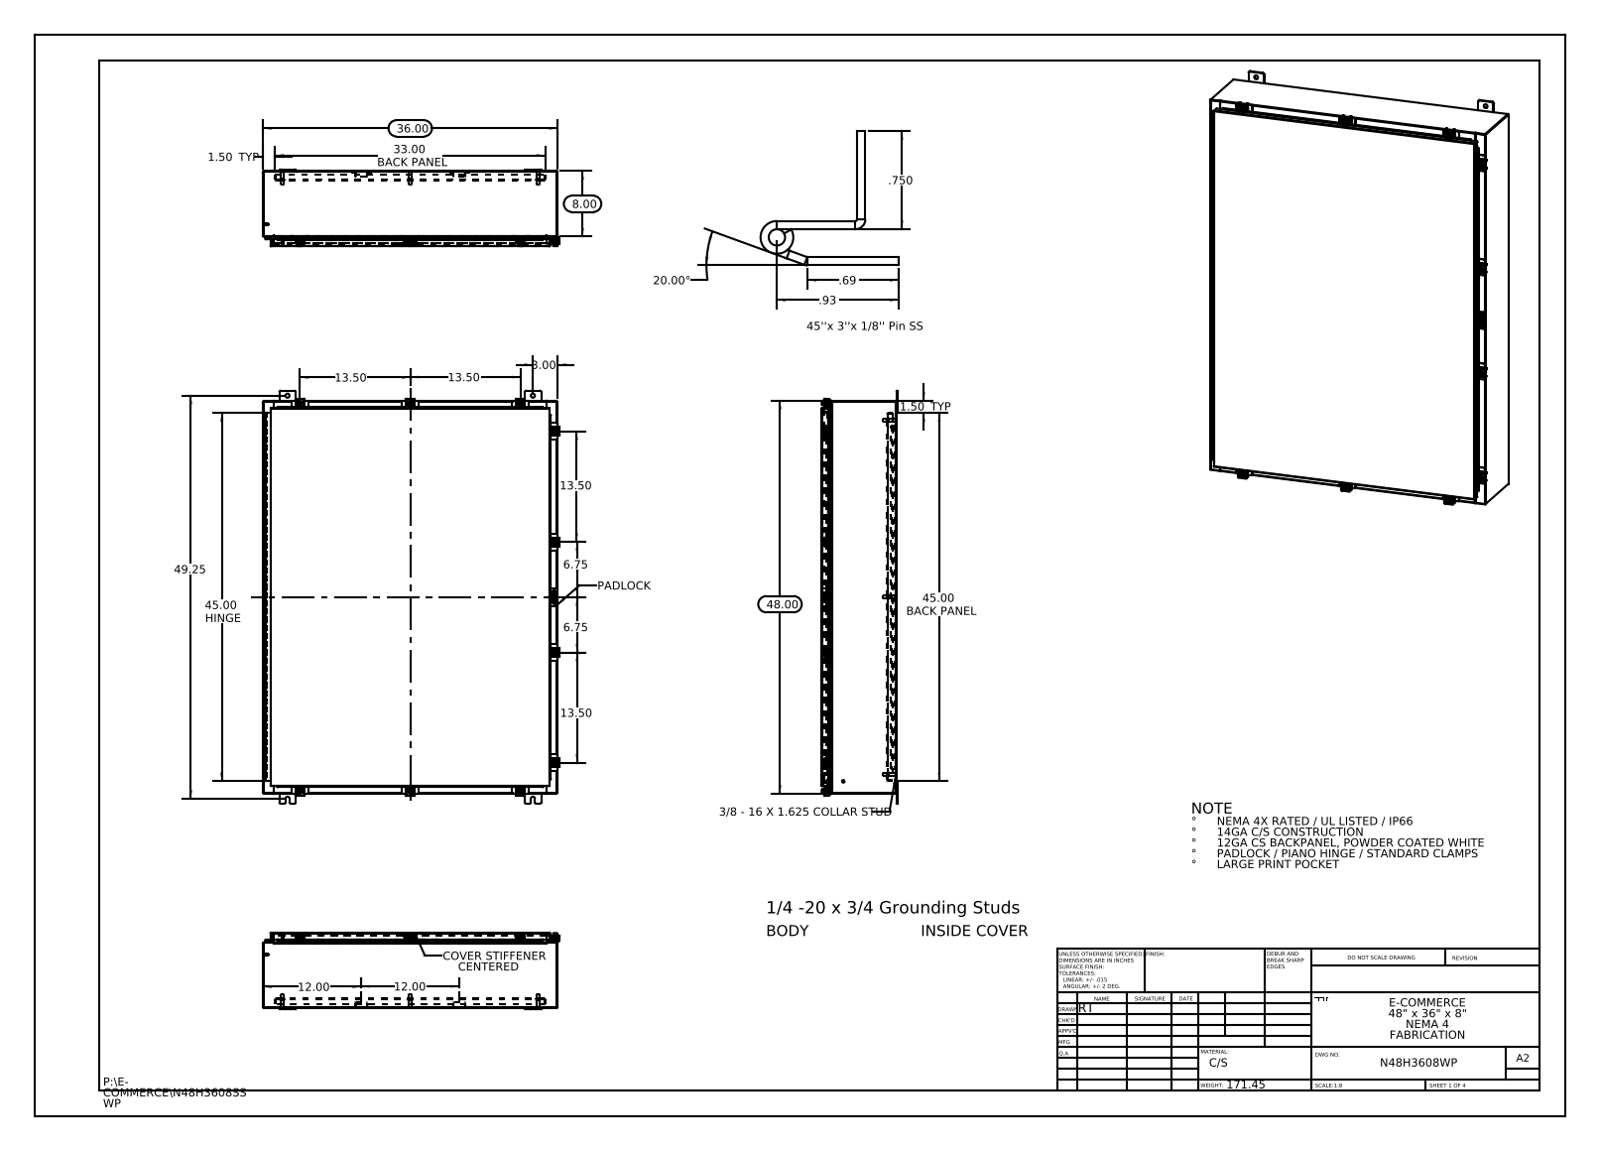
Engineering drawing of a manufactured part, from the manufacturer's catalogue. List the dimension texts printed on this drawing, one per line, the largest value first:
49.25
48.00
45.00 HINGE
45.00 BACK PANEL
36.00
33.00 BACK PANEL
20.00°
13.50
13.50
13.50
13.50
12.00
12.00
8.00
6.75
6.75
3.00
1.50 TYP
1.50 TYP
.93
.750
.69
